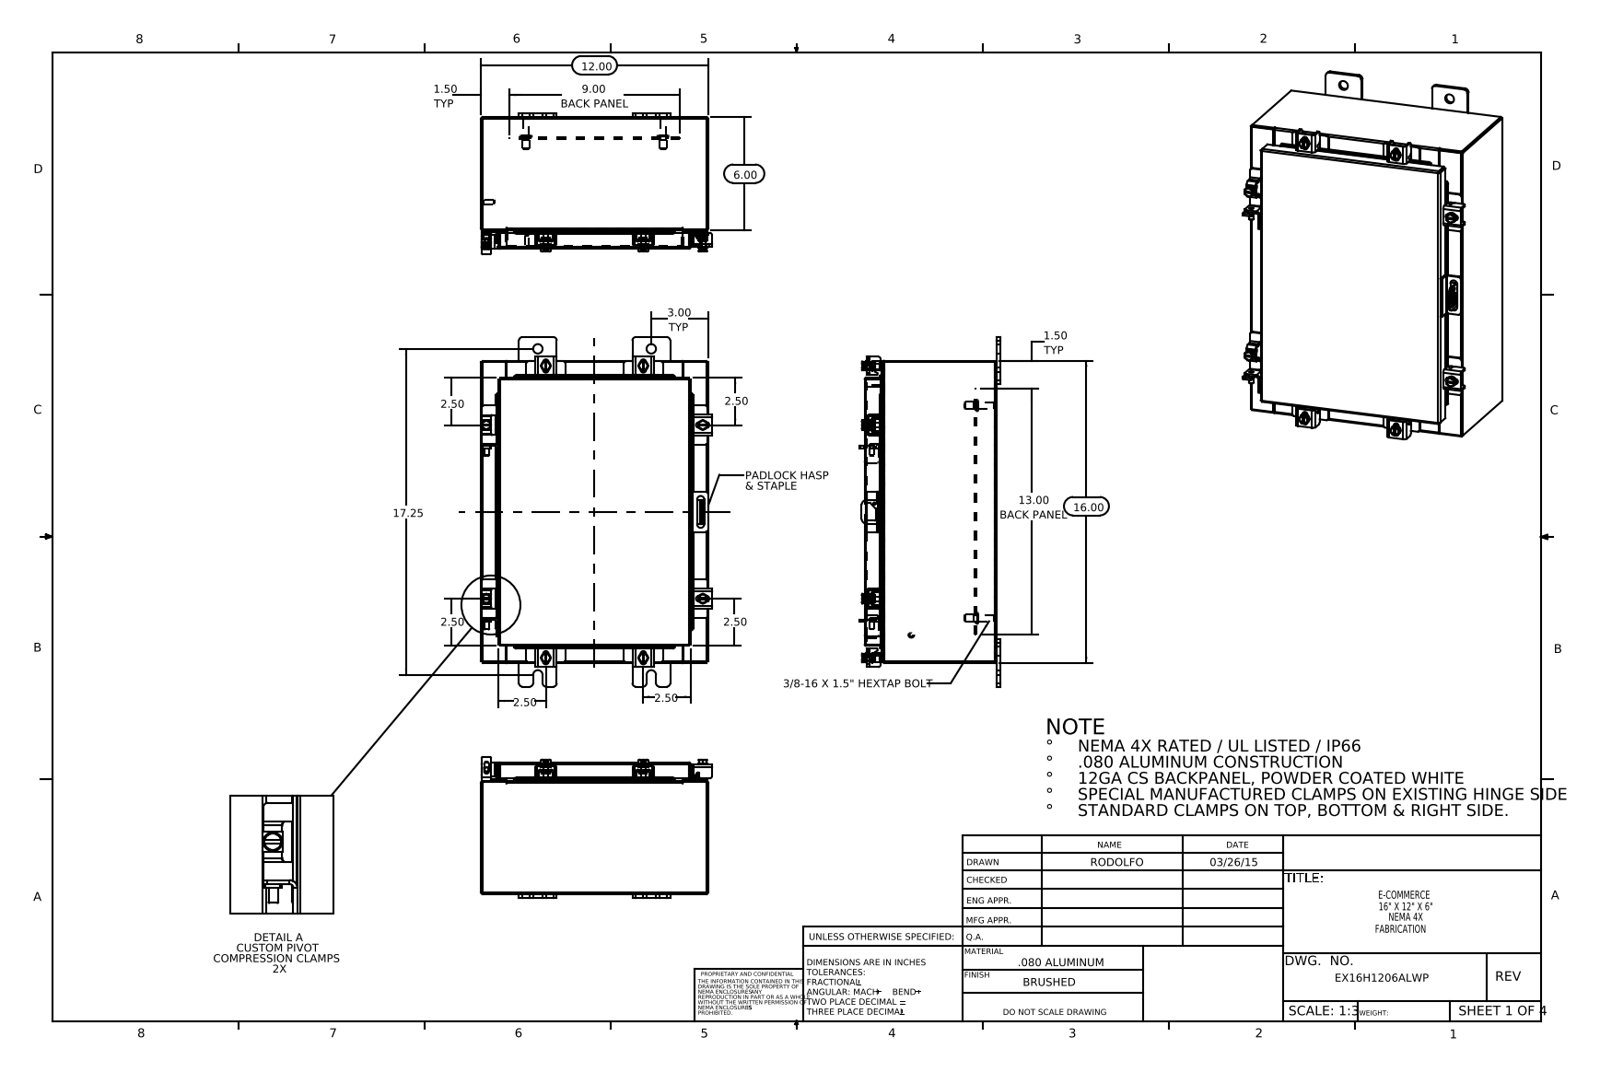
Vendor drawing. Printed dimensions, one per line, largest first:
17.25
16.00
13.00 BACK PANEL
12.00
9.00 BACK PANEL
6.00
3.00 TYP
2.50
2.50
2.50
2.50
2.50
2.50
1.50 TYP
1.50 TYP
